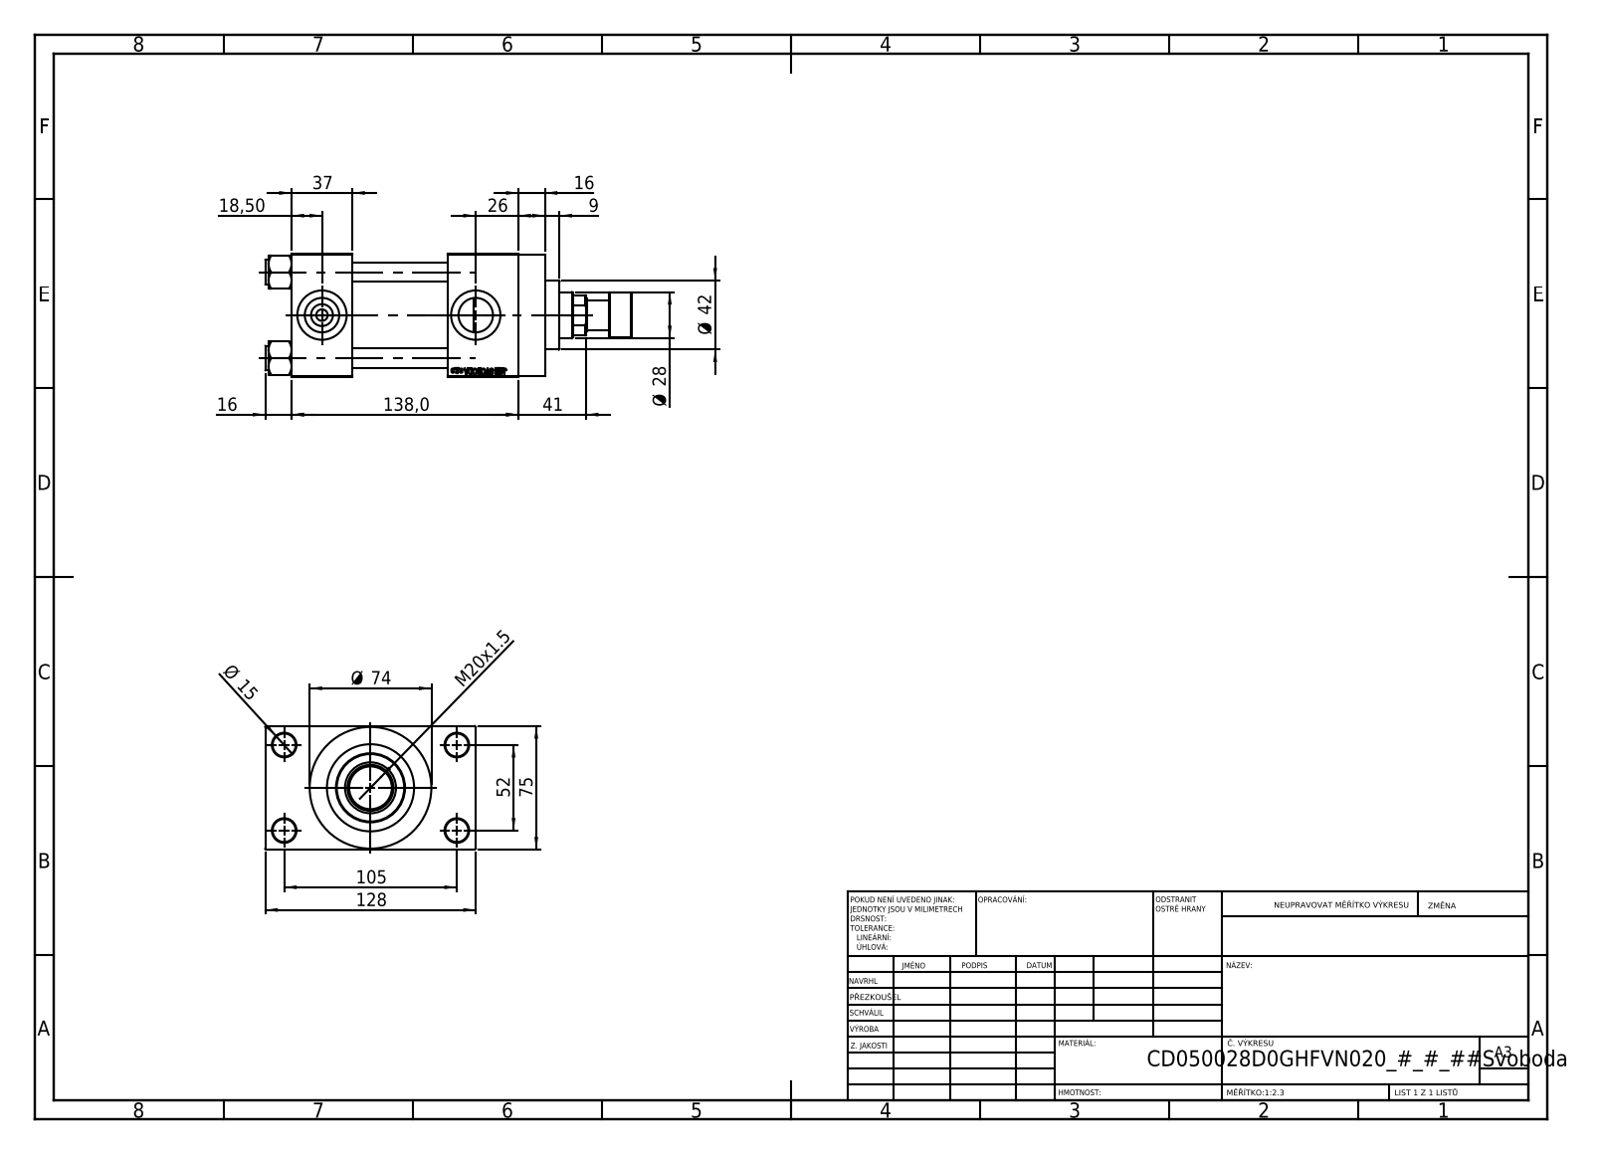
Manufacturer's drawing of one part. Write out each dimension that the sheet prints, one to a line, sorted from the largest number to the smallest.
138,0
128
105
75
Ø 74
52
Ø 42
41
37
Ø 28
26
M20x1.5
18,50
16
16
Ø 15
9
